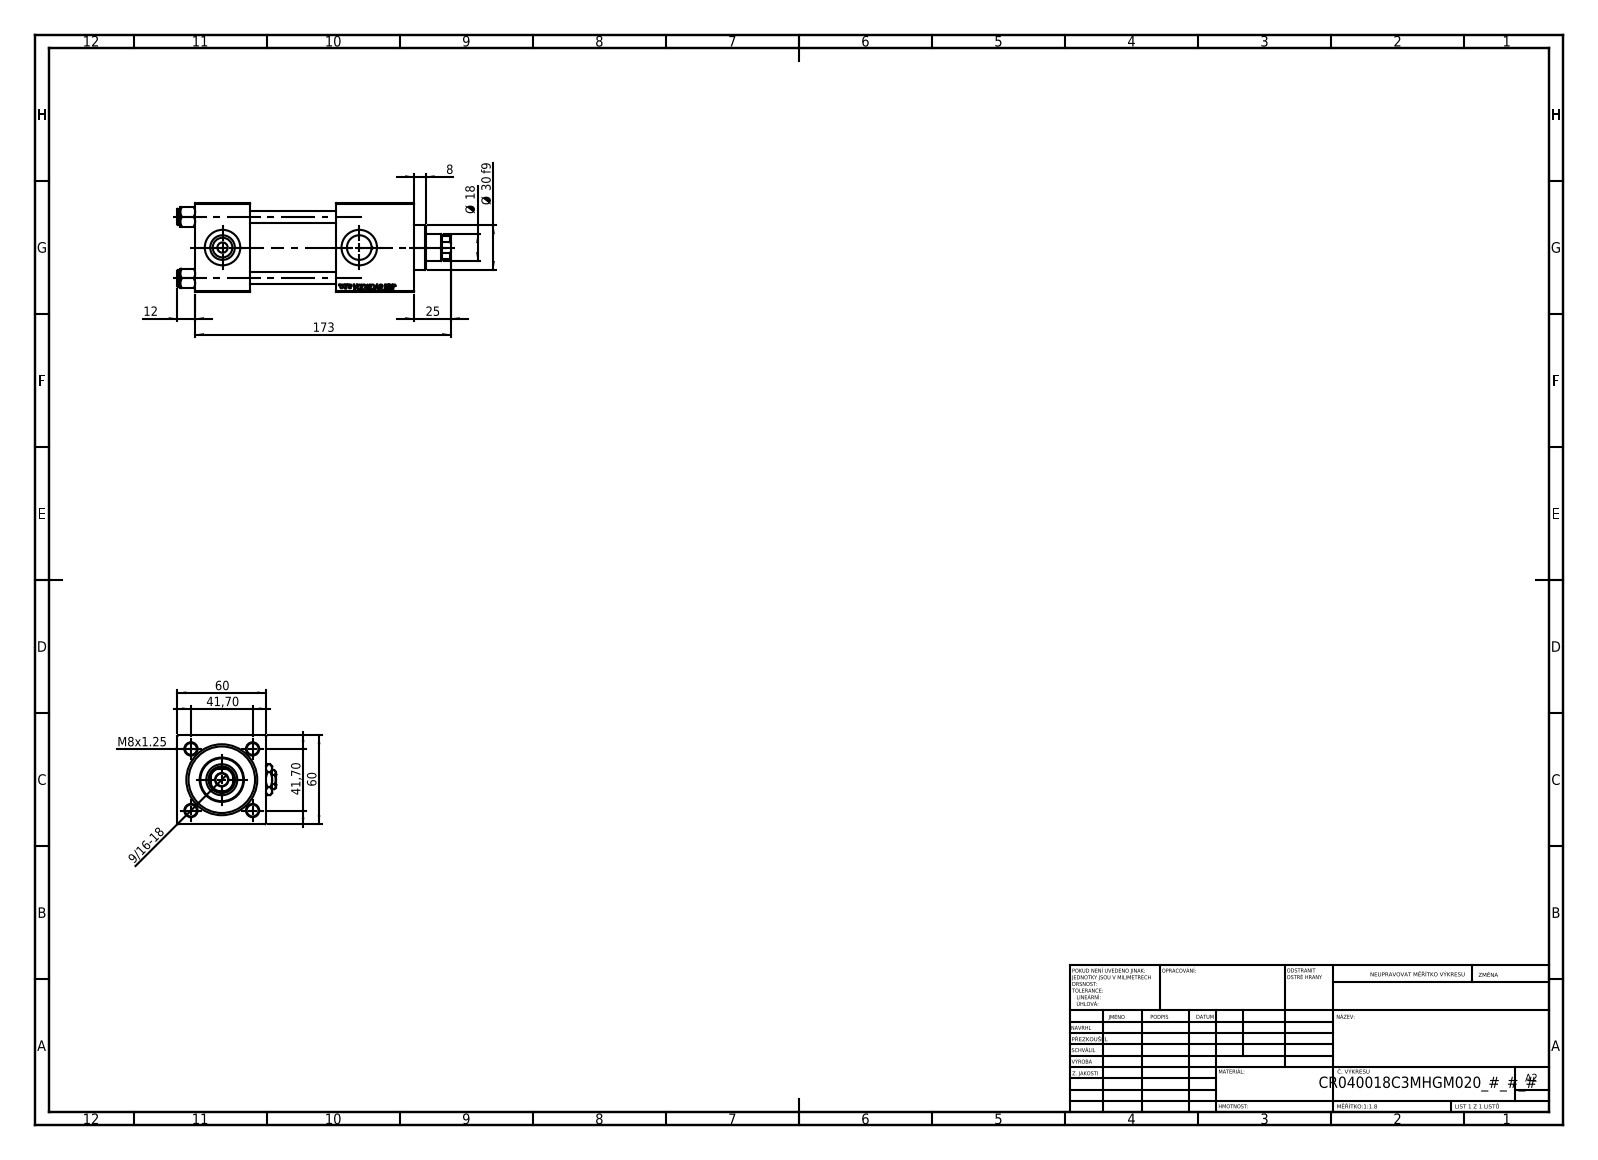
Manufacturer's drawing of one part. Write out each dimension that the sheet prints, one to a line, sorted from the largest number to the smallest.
173
60
60
41,70
41,70
Ø 30 f9
25
Ø 18
12
8
M8x1.25
9/16-18
